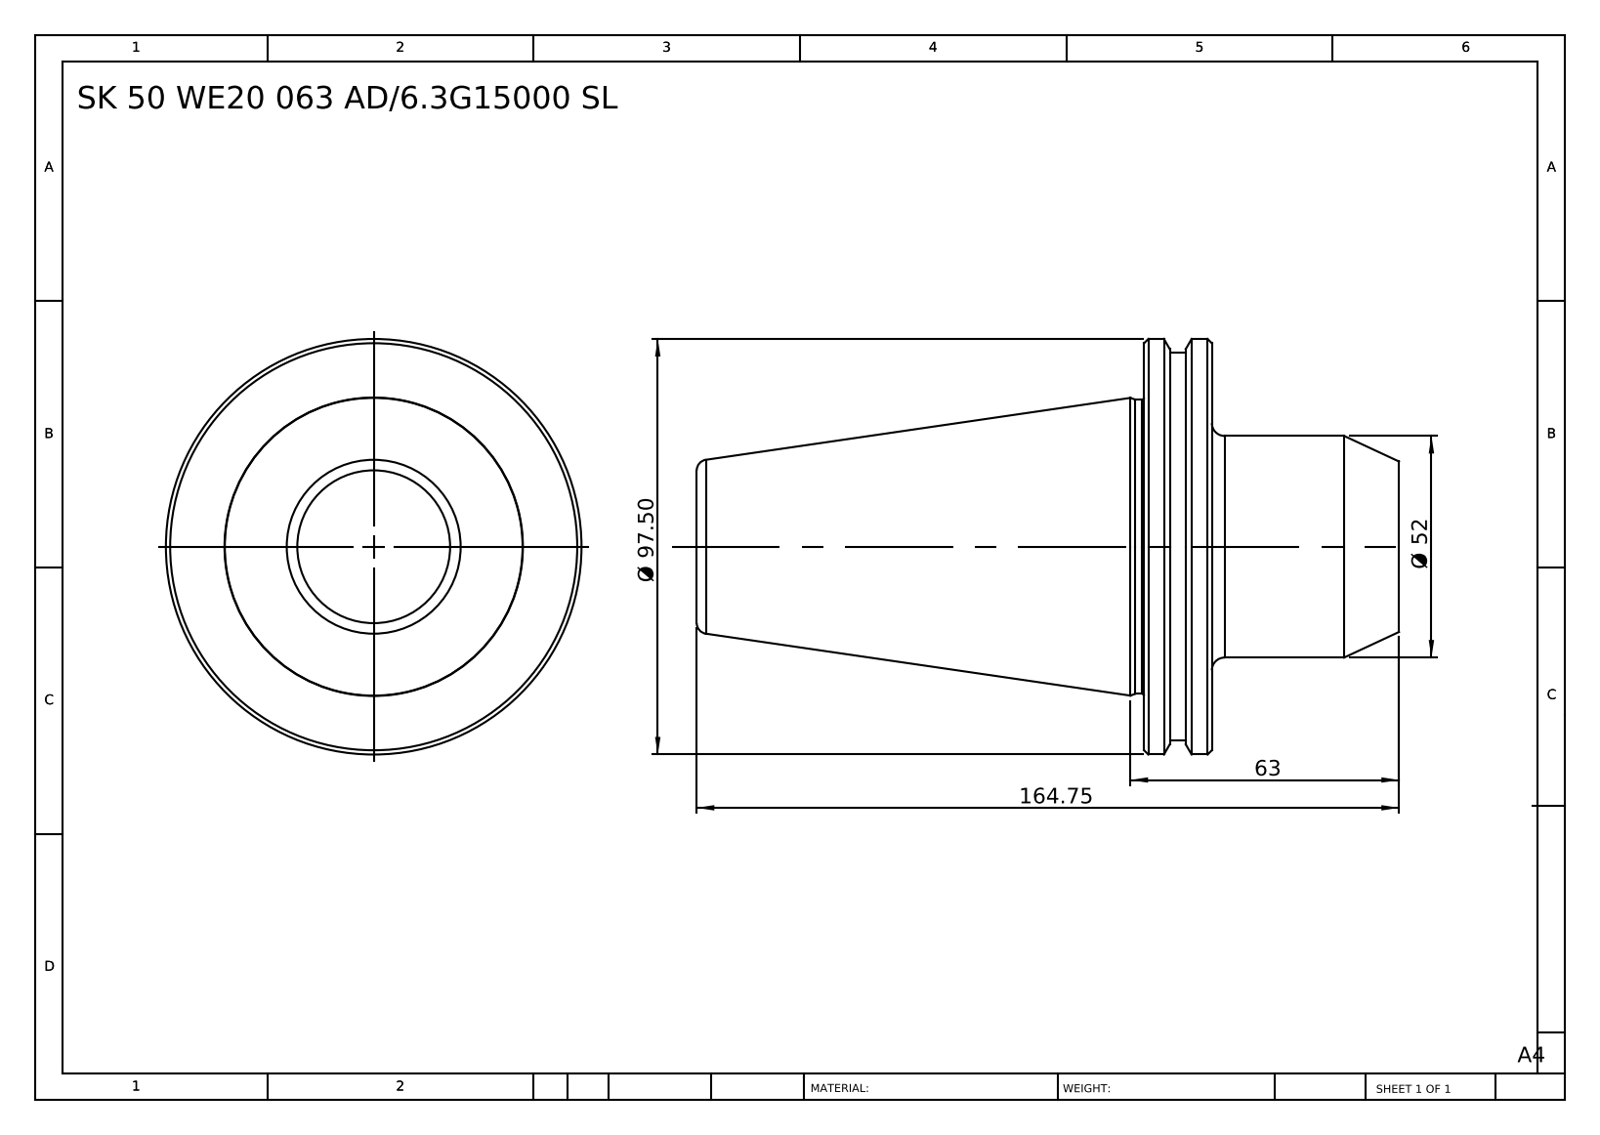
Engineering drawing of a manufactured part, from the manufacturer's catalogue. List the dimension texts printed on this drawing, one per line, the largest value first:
164.75
Ø 97.50
63
Ø 52
